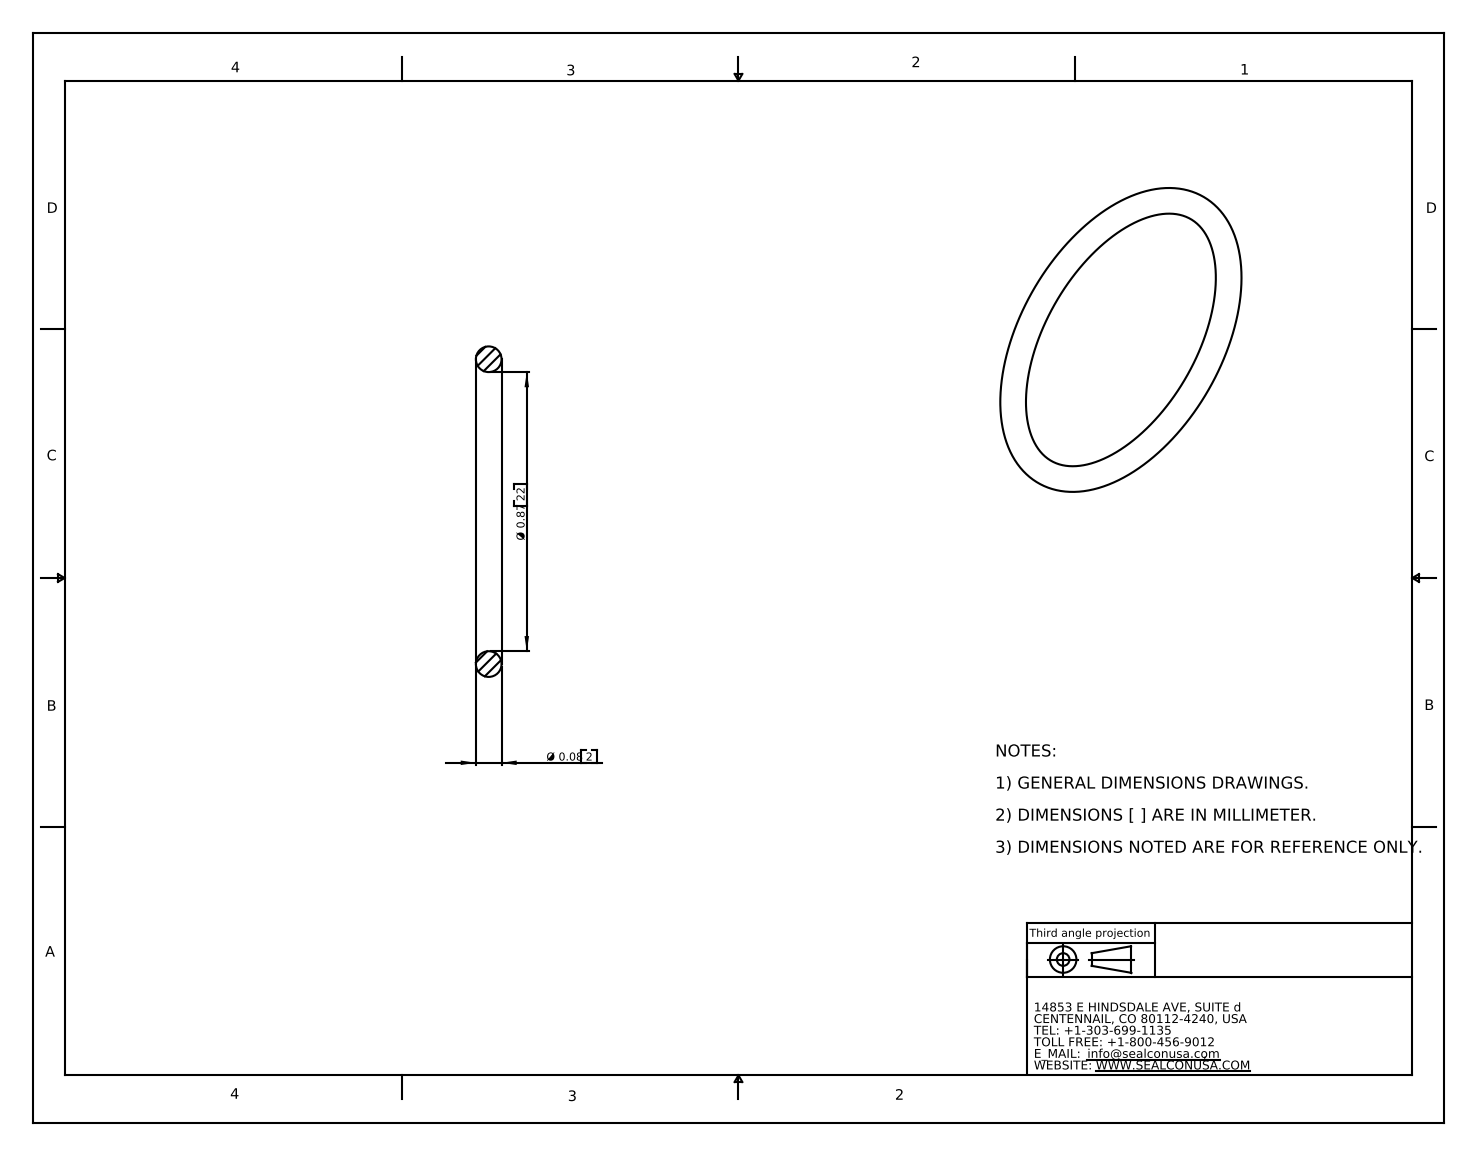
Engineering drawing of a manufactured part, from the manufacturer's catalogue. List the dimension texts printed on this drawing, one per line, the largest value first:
Ø 0.87 22
Ø 0.08 2
